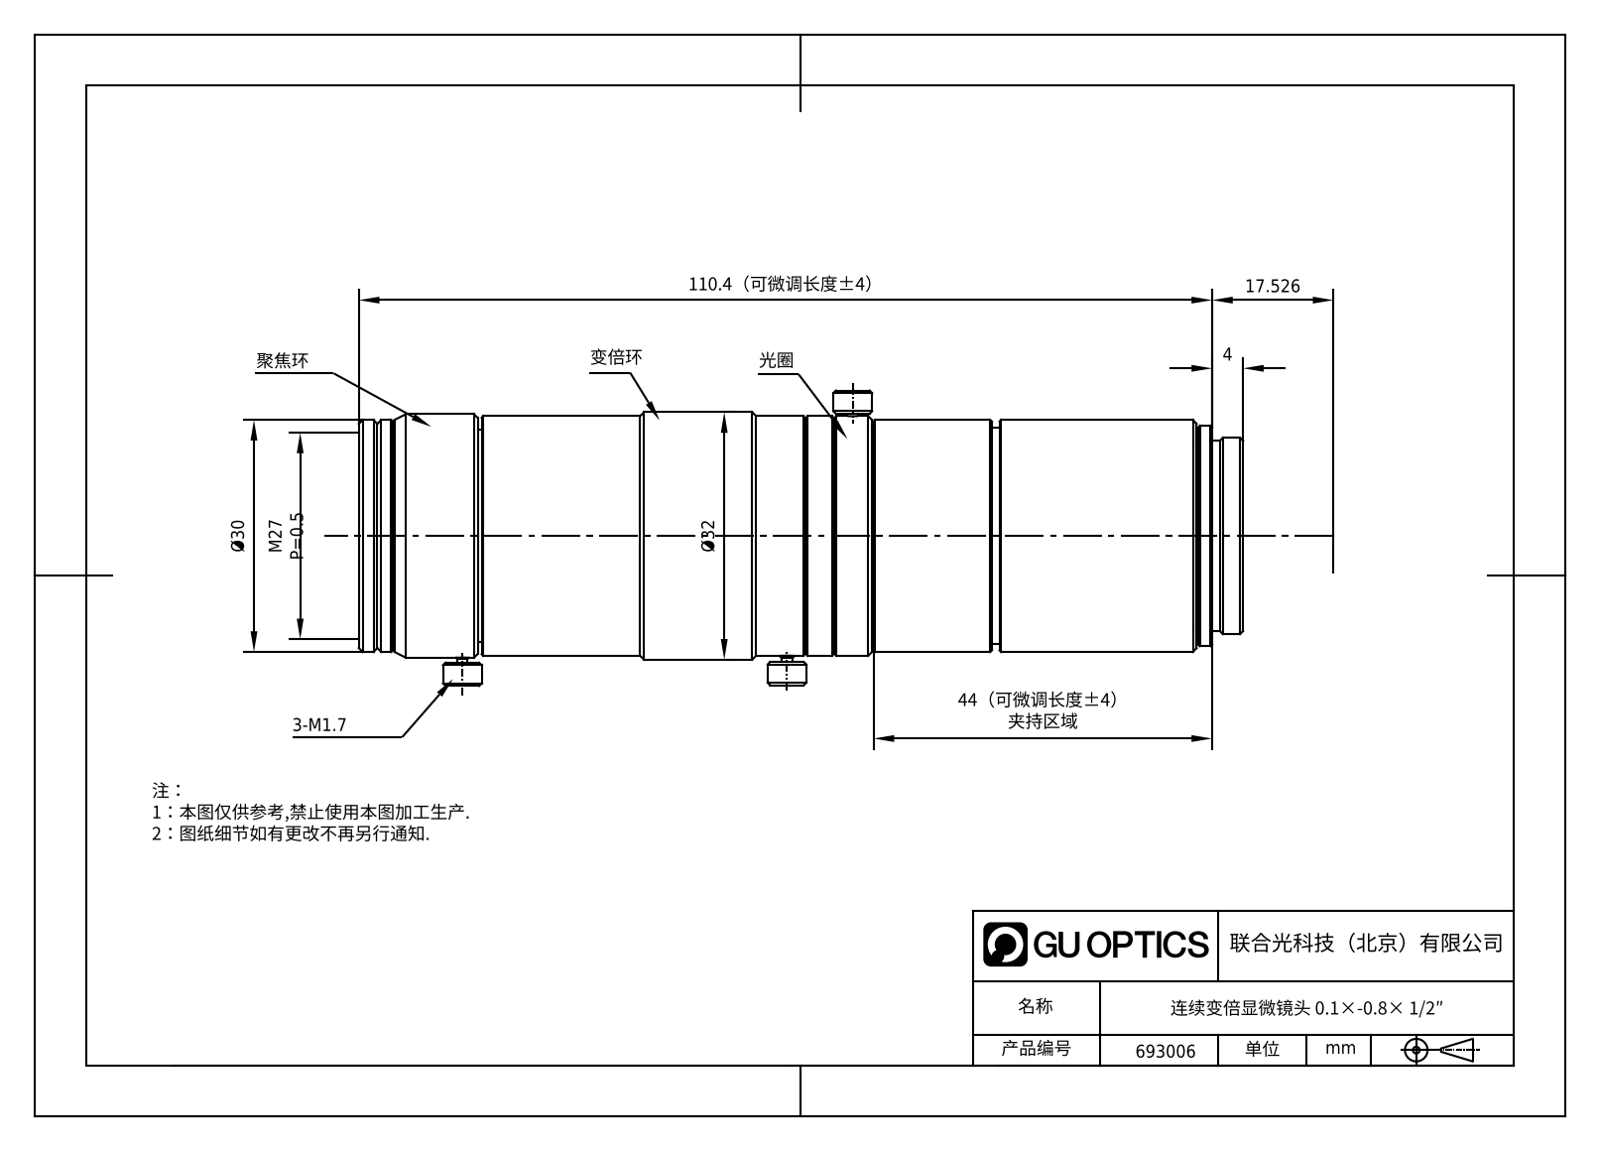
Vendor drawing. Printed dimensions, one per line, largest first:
110.4（可微调长度±4）
44（可微调长度±4） 夹持区域
Ø32
Ø30
M27 P=0.5
17.526
4
